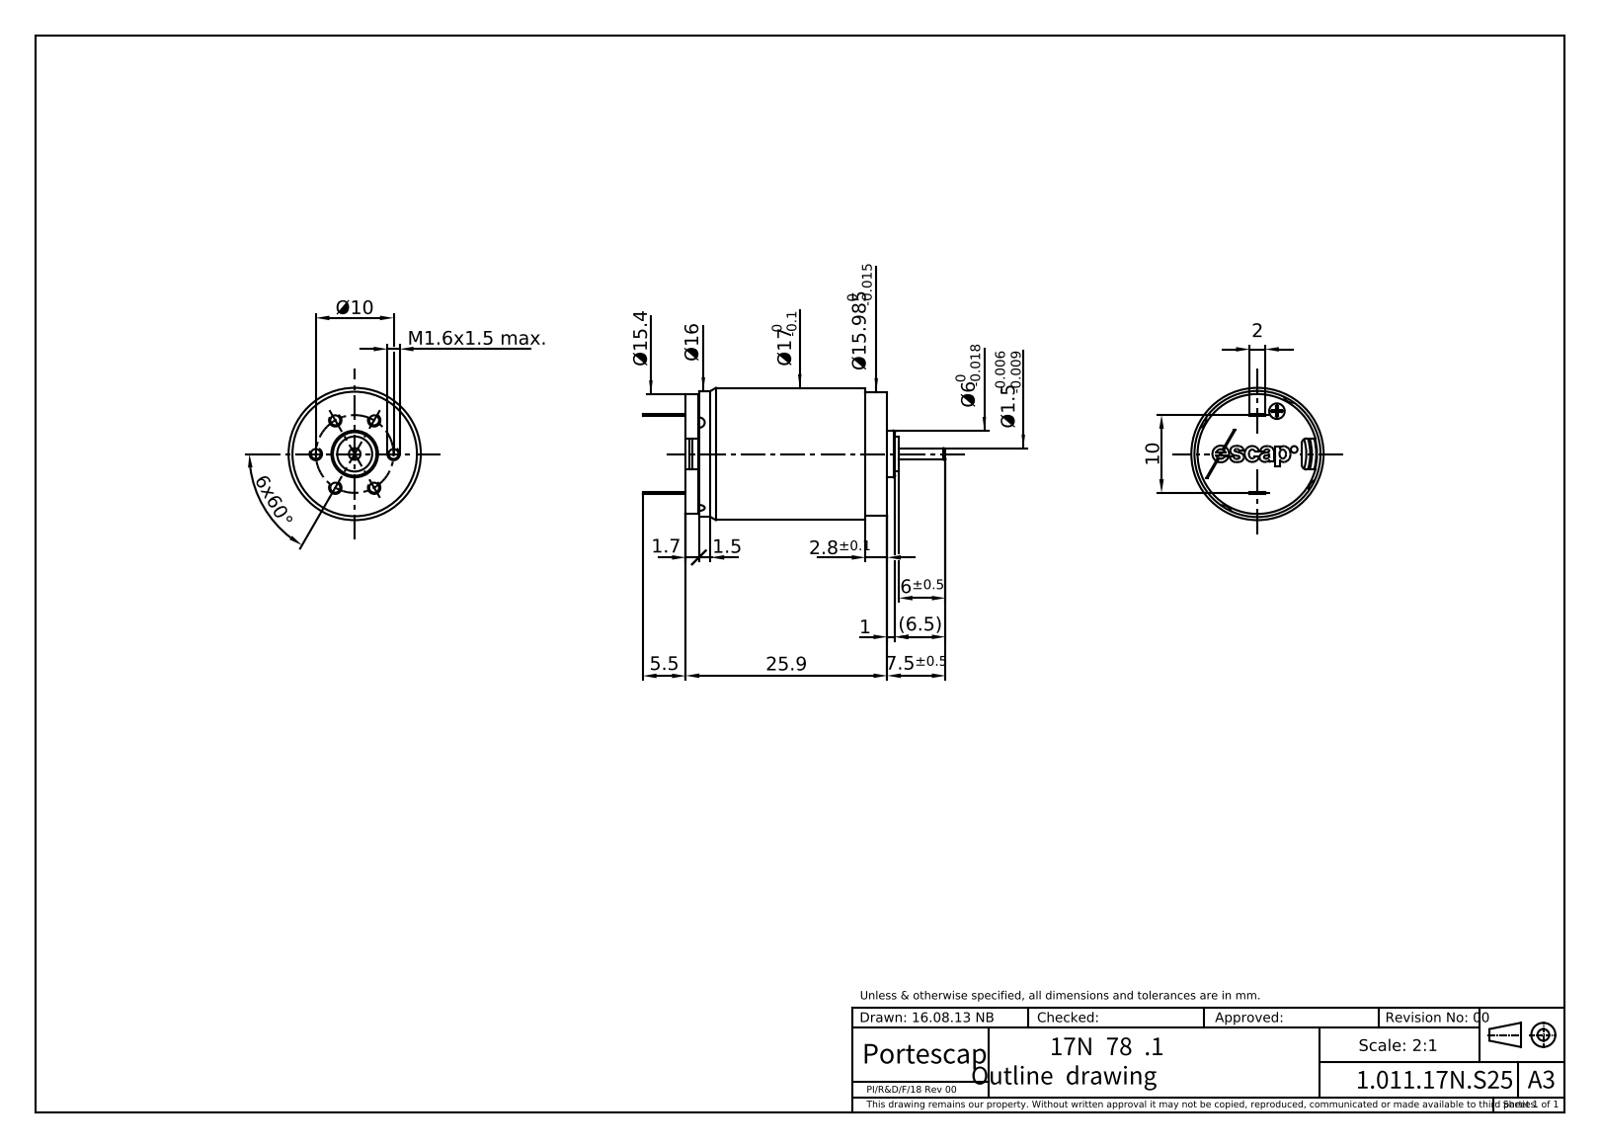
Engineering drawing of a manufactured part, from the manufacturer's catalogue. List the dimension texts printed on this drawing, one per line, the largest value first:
6x60°
25.9
10
Ø10
7.5±0.5
(6.5)
6±0.5
5.5
2.8±0.1
2
1.7
M1.6x1.5 max.
1.5
1
